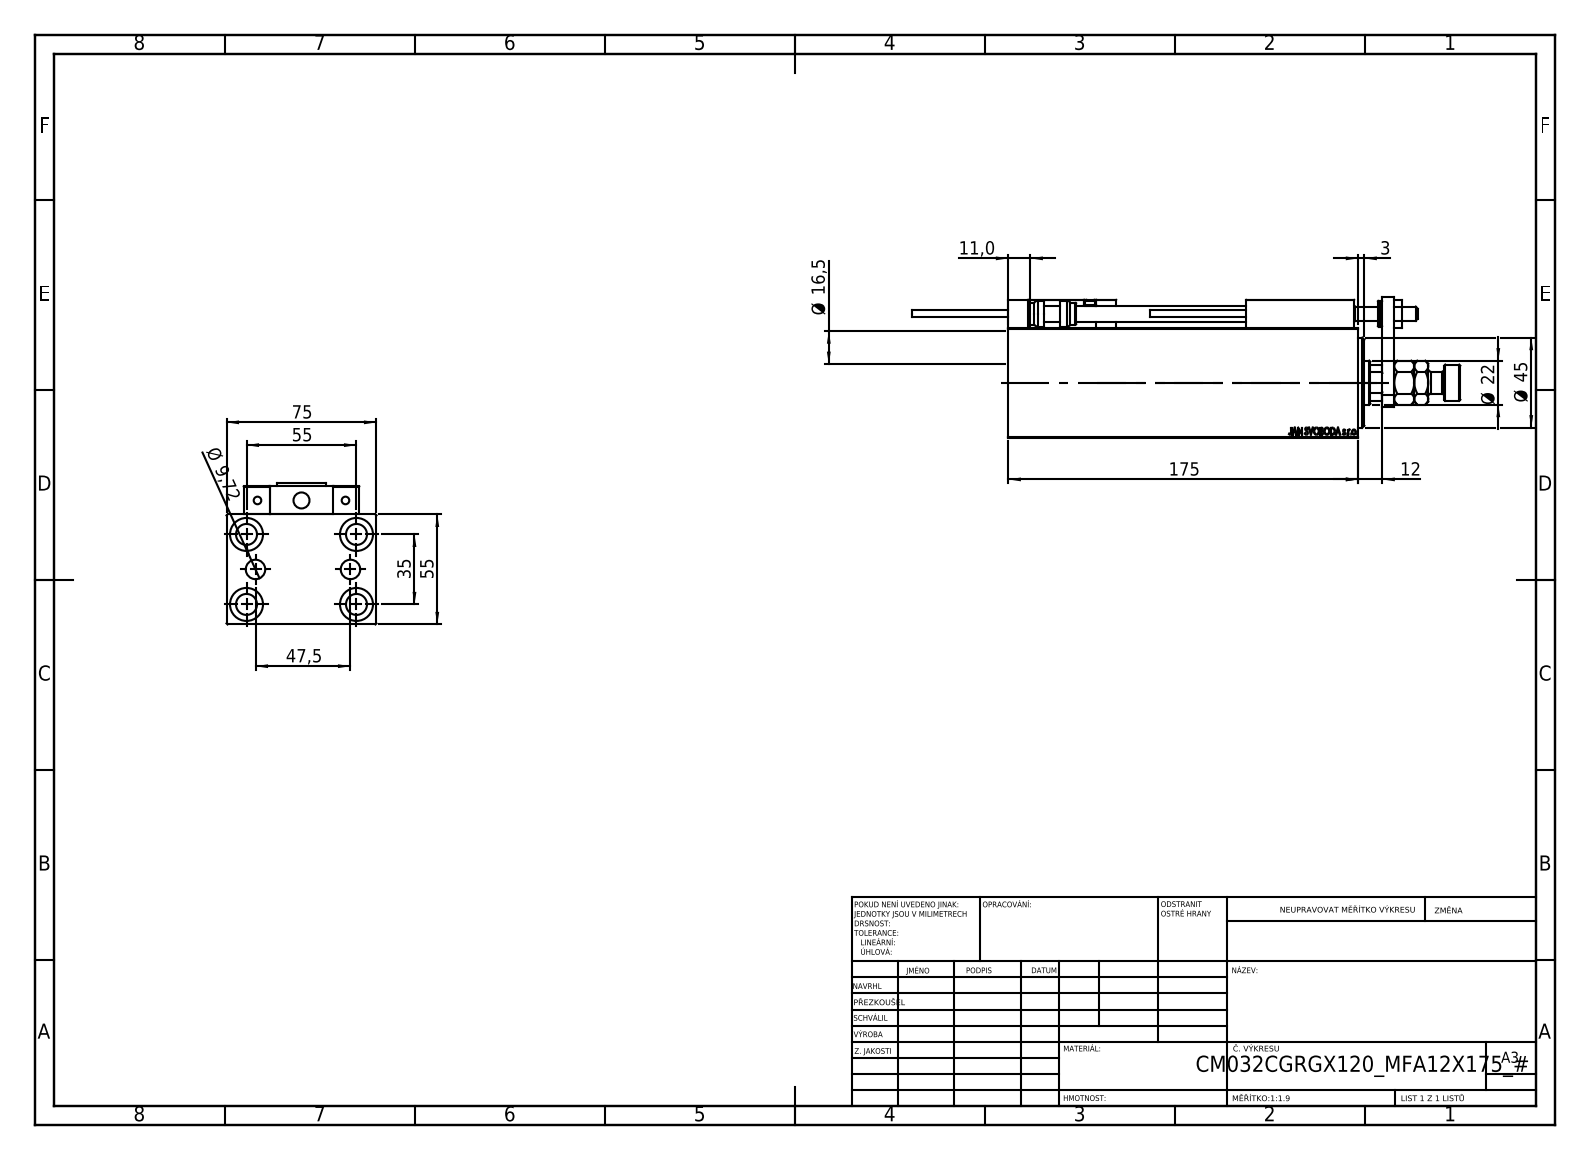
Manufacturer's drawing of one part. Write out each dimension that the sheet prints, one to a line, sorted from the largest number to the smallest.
175
75
55
55
47,5
Ø 45
35
Ø 22
Ø 16,5
12
11,0
Ø 9,72
3
